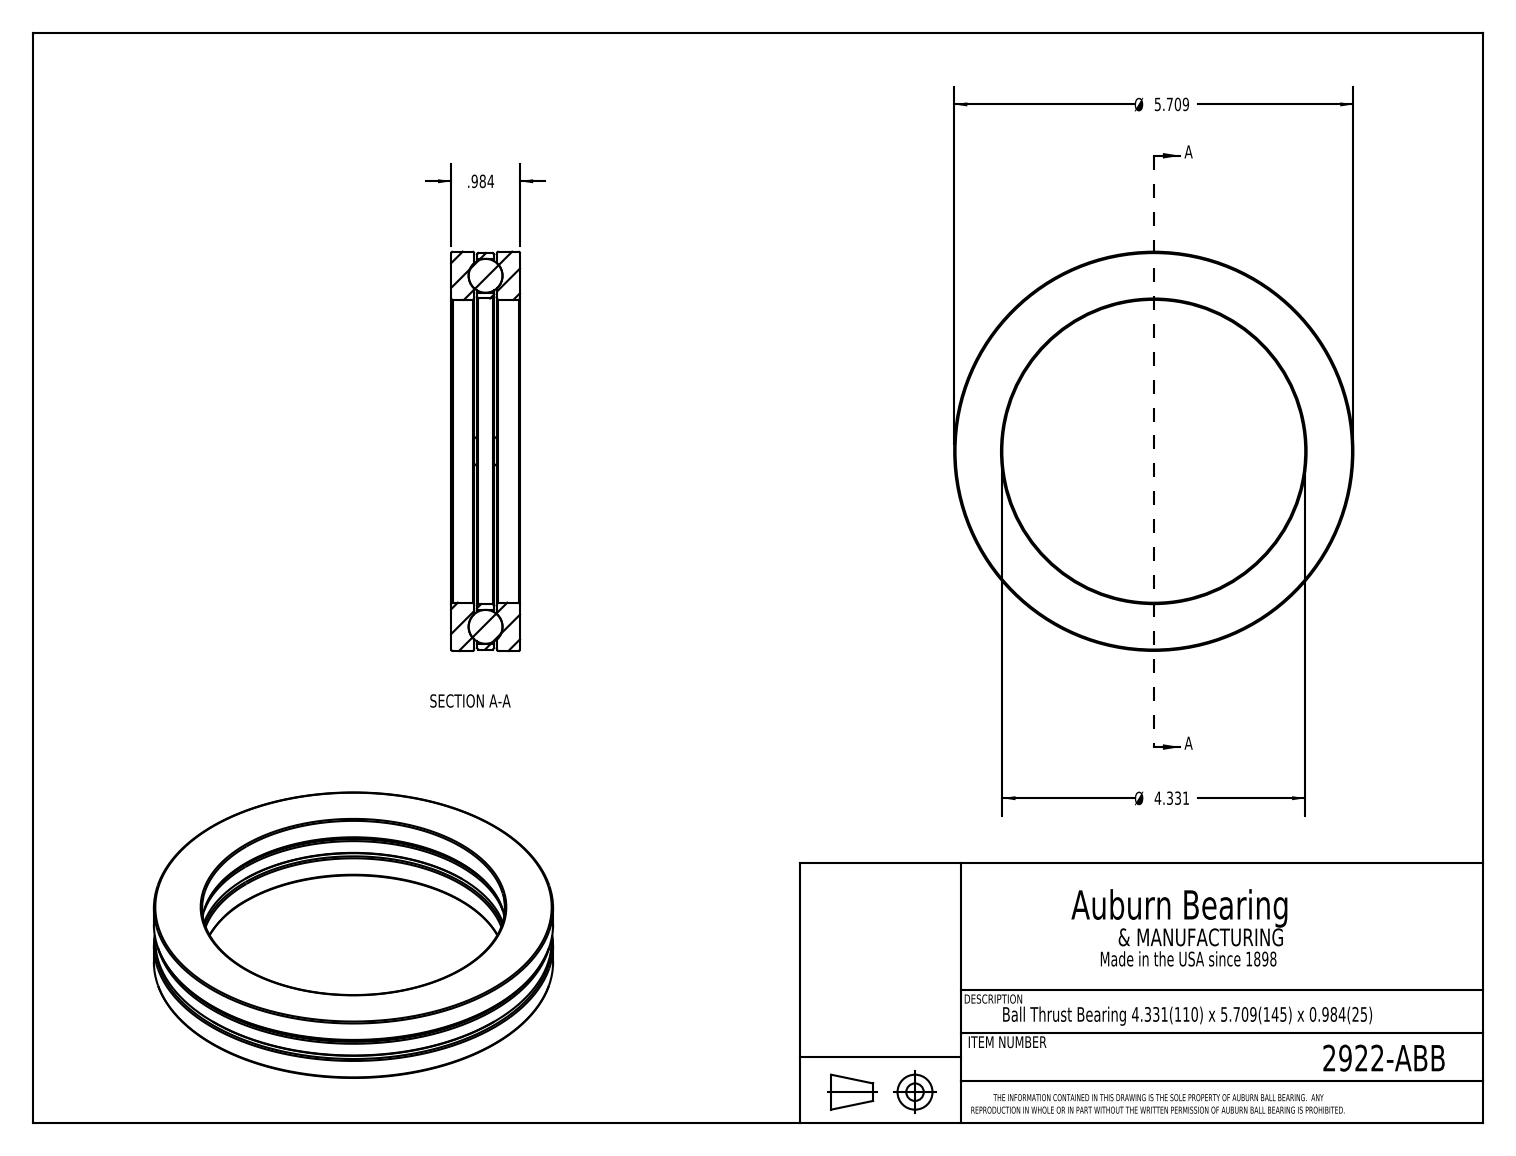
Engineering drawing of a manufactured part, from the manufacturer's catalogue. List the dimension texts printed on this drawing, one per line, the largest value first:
Ø 5.709
Ø 4.331
.984
